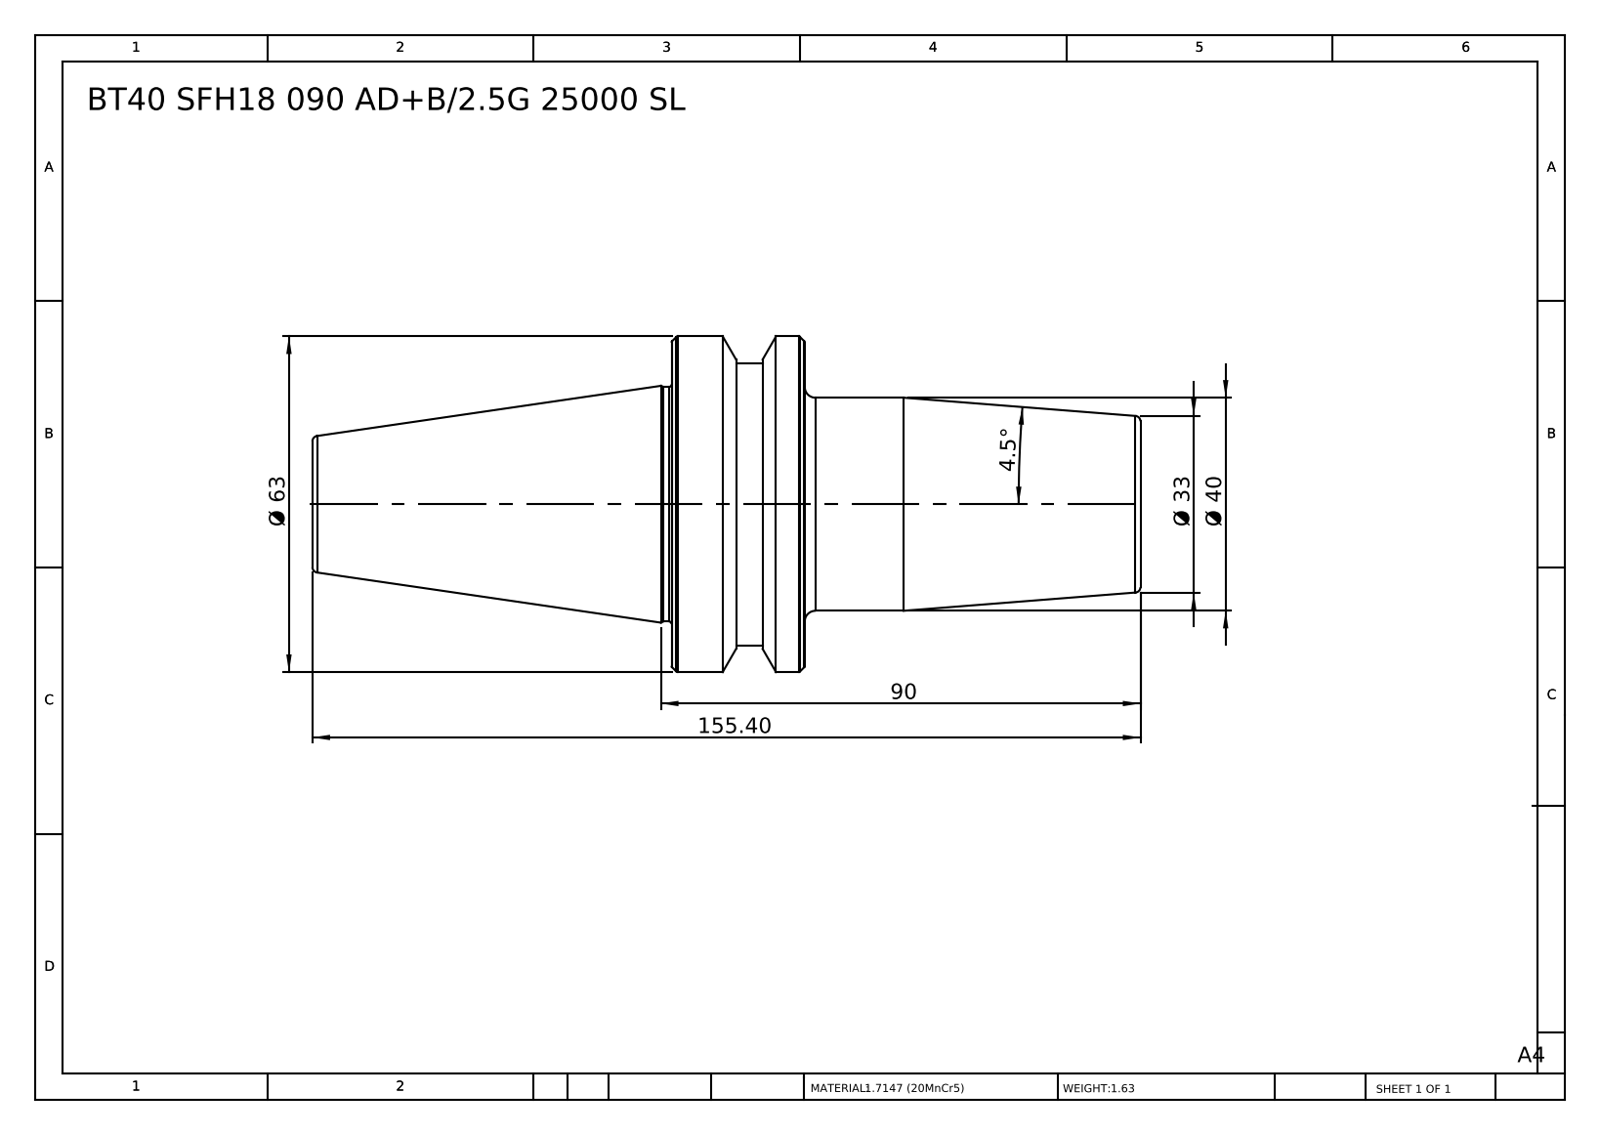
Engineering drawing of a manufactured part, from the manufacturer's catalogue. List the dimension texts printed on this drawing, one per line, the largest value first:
155.40
90
Ø 63
Ø 40
Ø 33
4.5°
